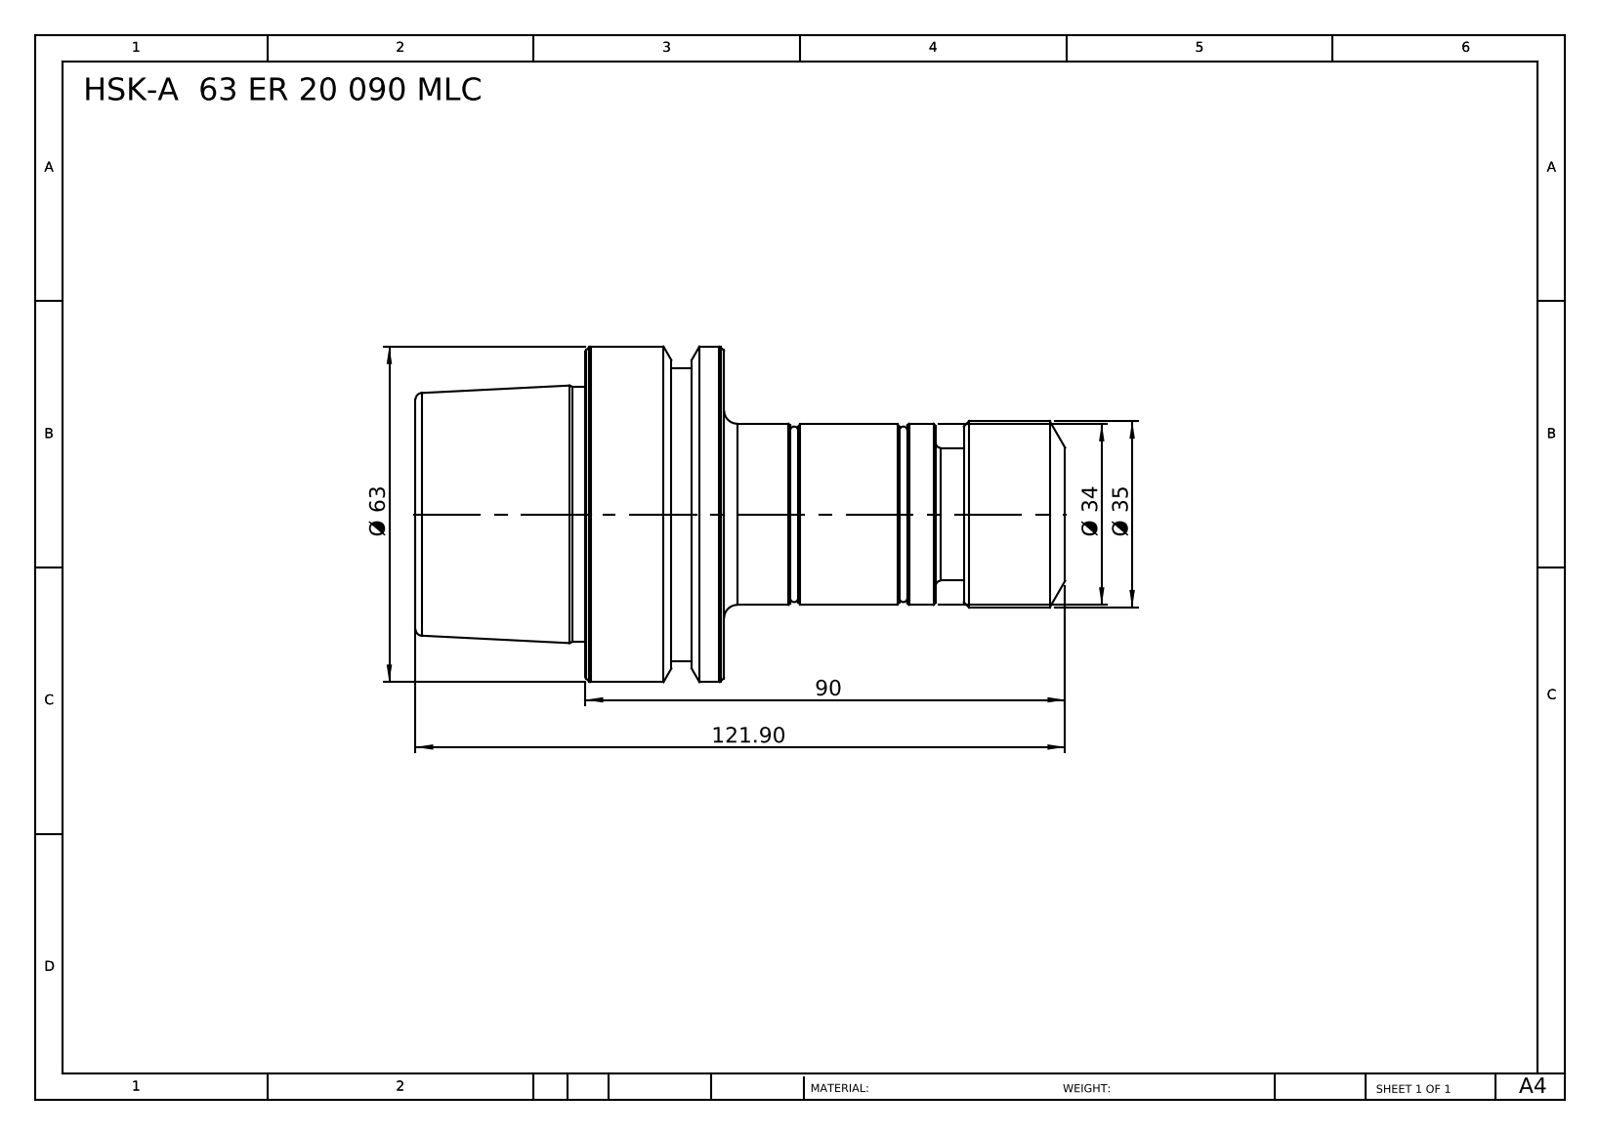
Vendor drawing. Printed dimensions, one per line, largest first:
121.90
90
Ø 63
Ø 35
Ø 34
